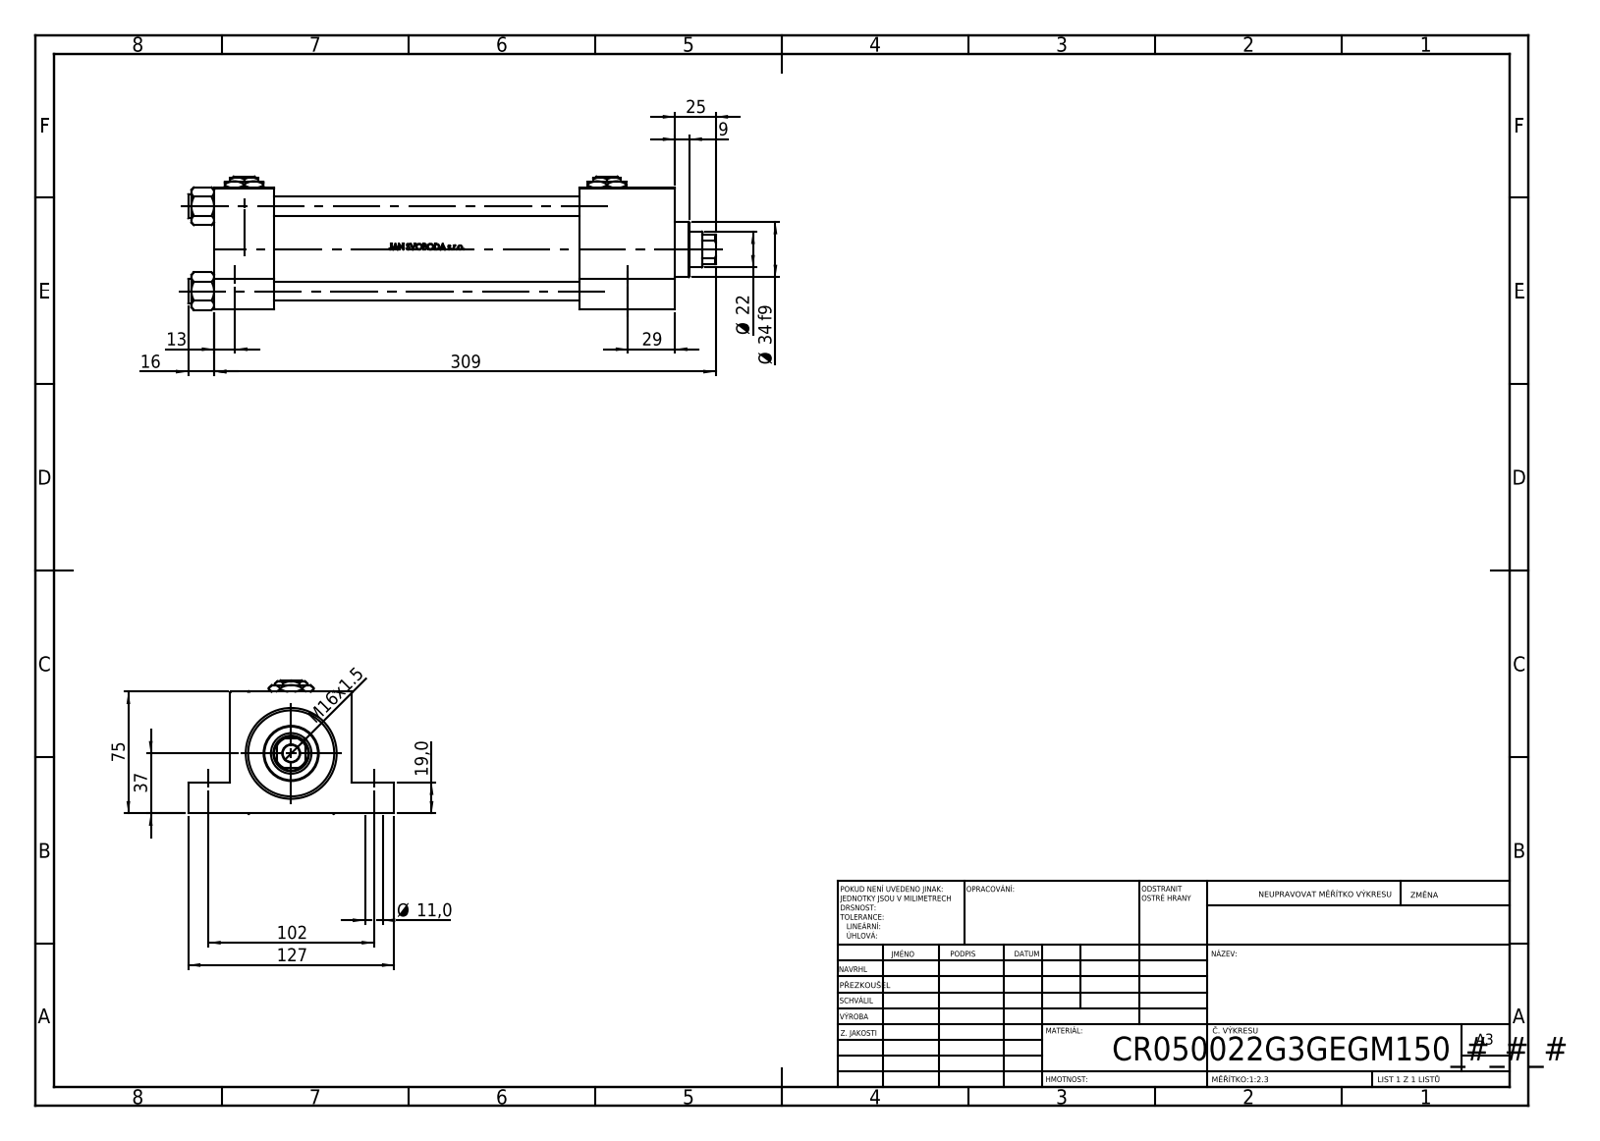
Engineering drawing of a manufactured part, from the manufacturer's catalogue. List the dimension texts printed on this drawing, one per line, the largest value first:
309
127
102
75
37
Ø 34 f9
29
25
Ø 22
19,0
16
M16x1.5
13
Ø 11,0
9
